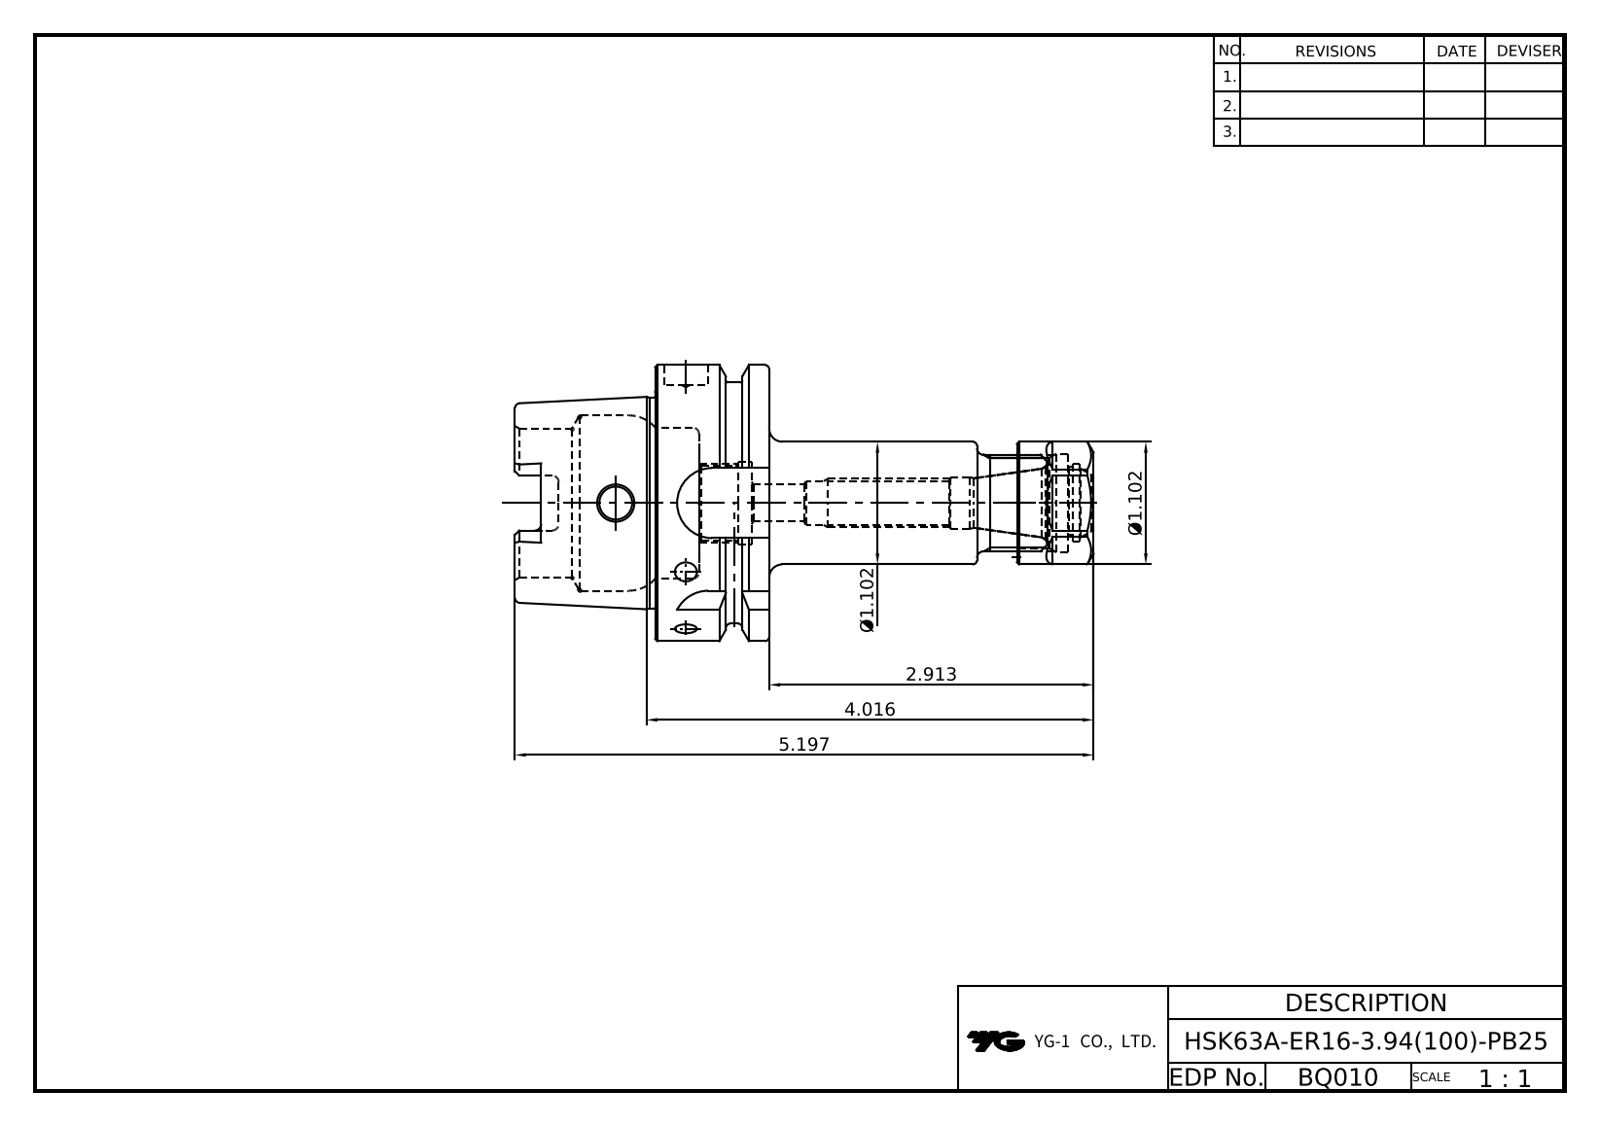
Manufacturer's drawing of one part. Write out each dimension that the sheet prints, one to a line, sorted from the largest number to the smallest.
5.197
4.016
2.913
Ø1.102
Ø1.102
